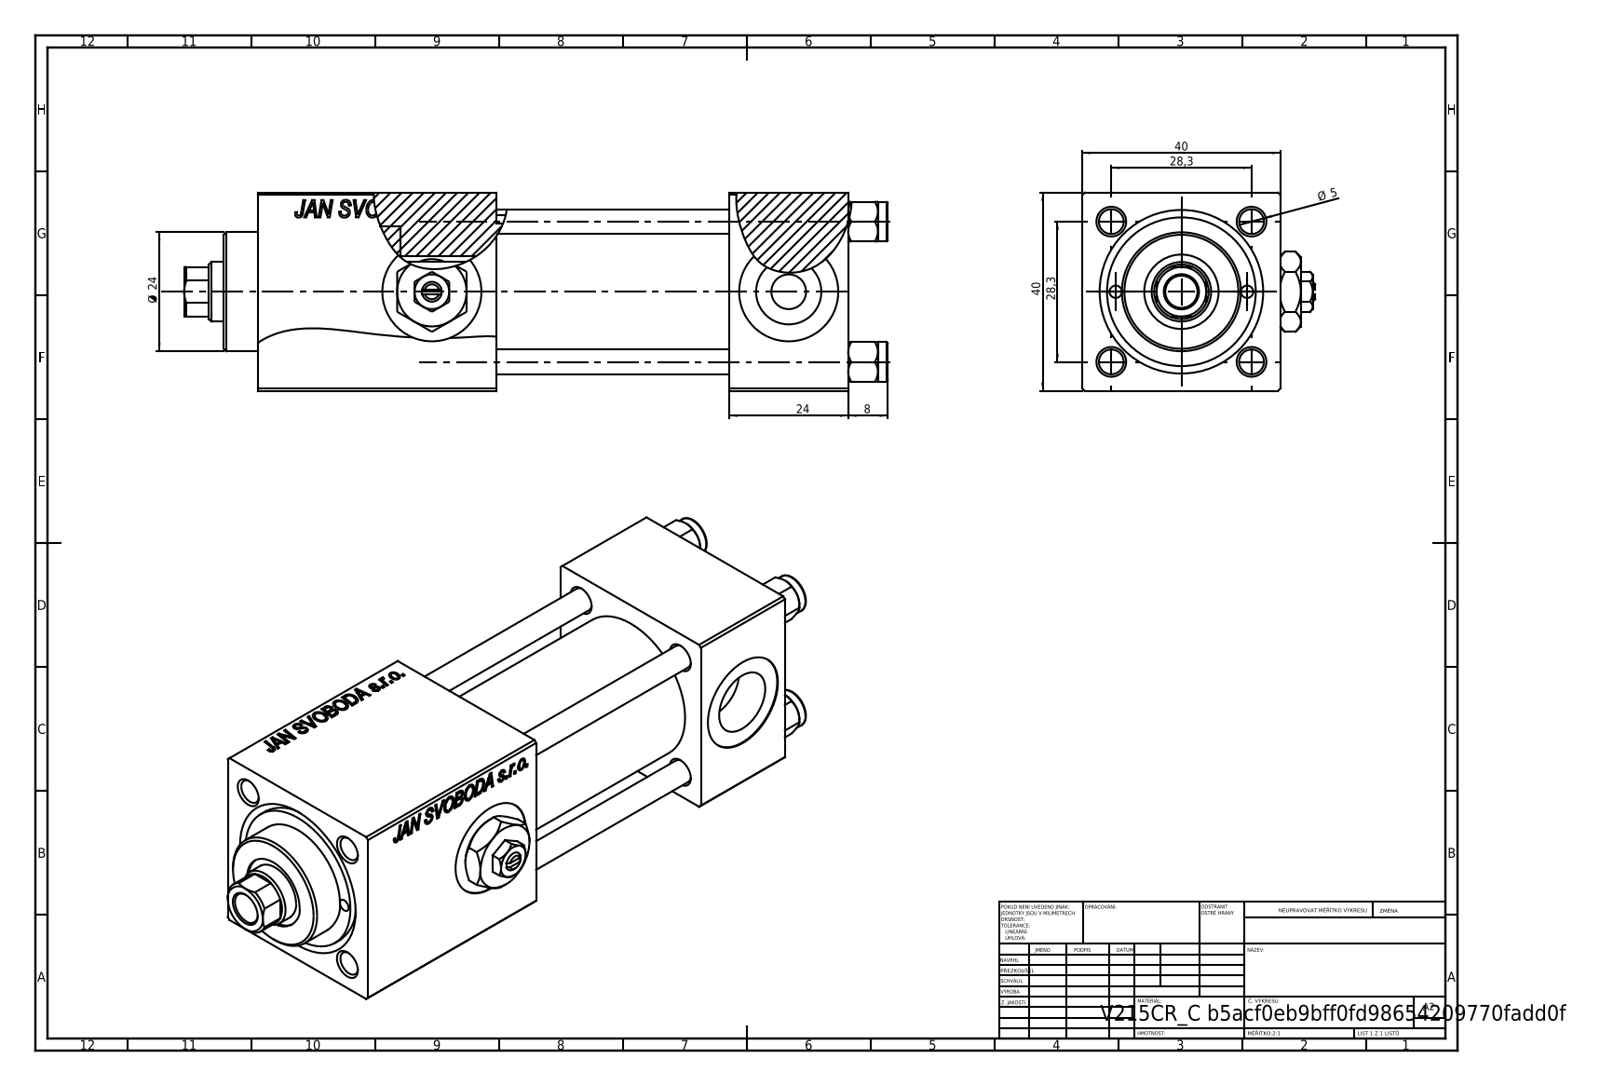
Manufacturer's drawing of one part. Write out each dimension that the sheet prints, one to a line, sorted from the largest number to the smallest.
40
40
28,3
28,3
24
Ø 24
8
Ø 5
